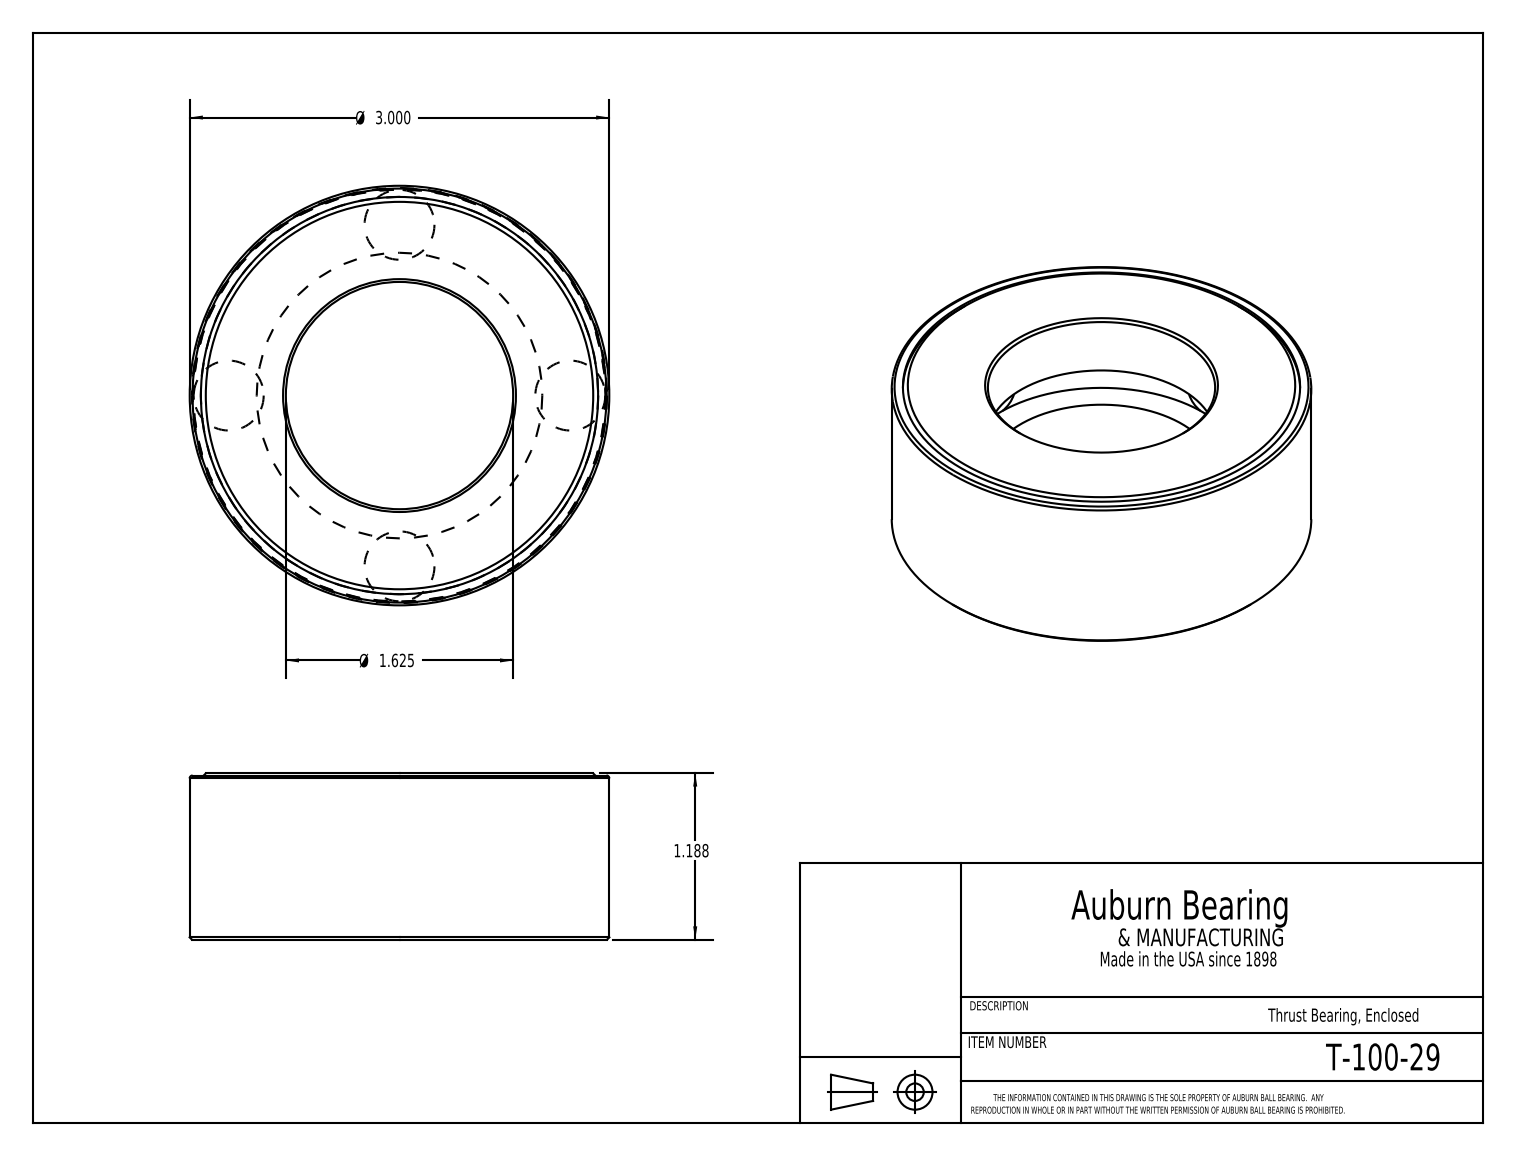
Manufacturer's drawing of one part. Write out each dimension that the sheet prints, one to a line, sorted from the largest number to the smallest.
Ø 3.000
Ø 1.625
1.188
